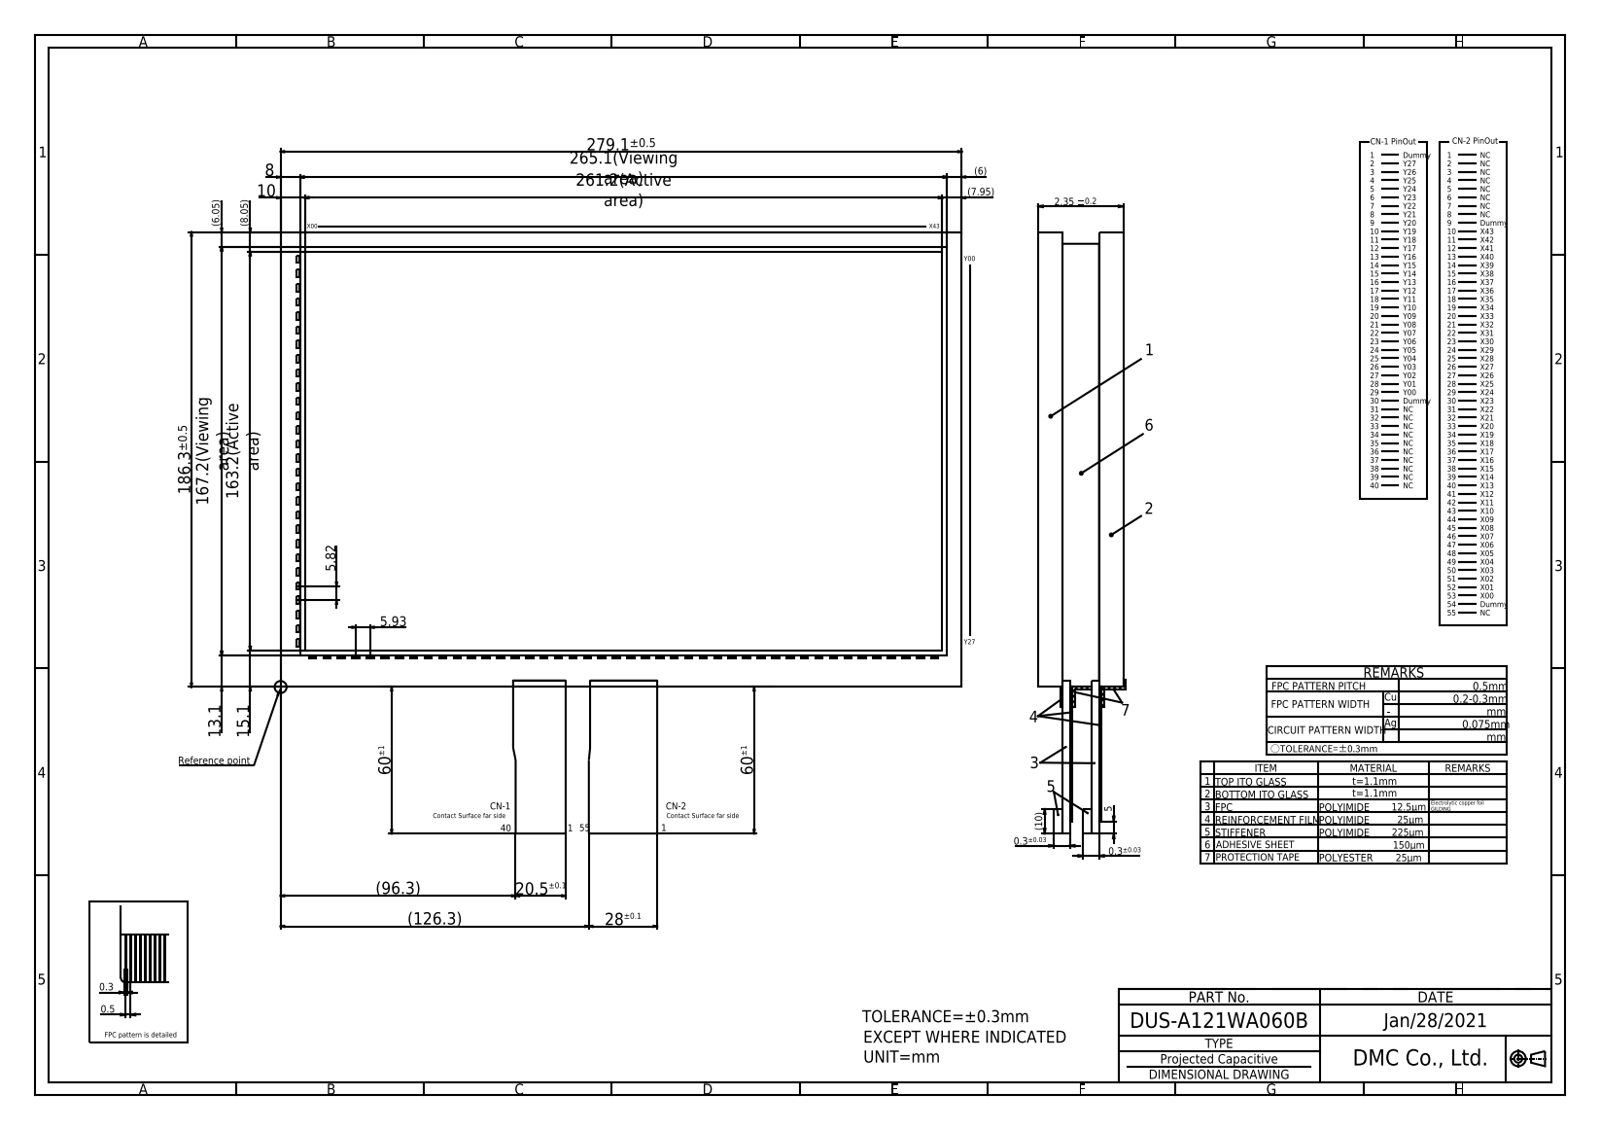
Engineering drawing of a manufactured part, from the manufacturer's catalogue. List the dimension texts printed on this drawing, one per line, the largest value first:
279.1±0.5
265.1(Viewing area)
261.2(Active area)
186.3±0.5
167.2(Viewing area)
163.2(Active area)
(126.3)
(96.3)
60±1
60±1
28±0.1
20.5±0.1
15.1
13.1
(10)
10
(8.05)
8
(7.95)
(6.05)
(6)
5.93
5.82
5
2.35 ±0.2
0.5
0.3
0.3±0.03
0.3±0.03
